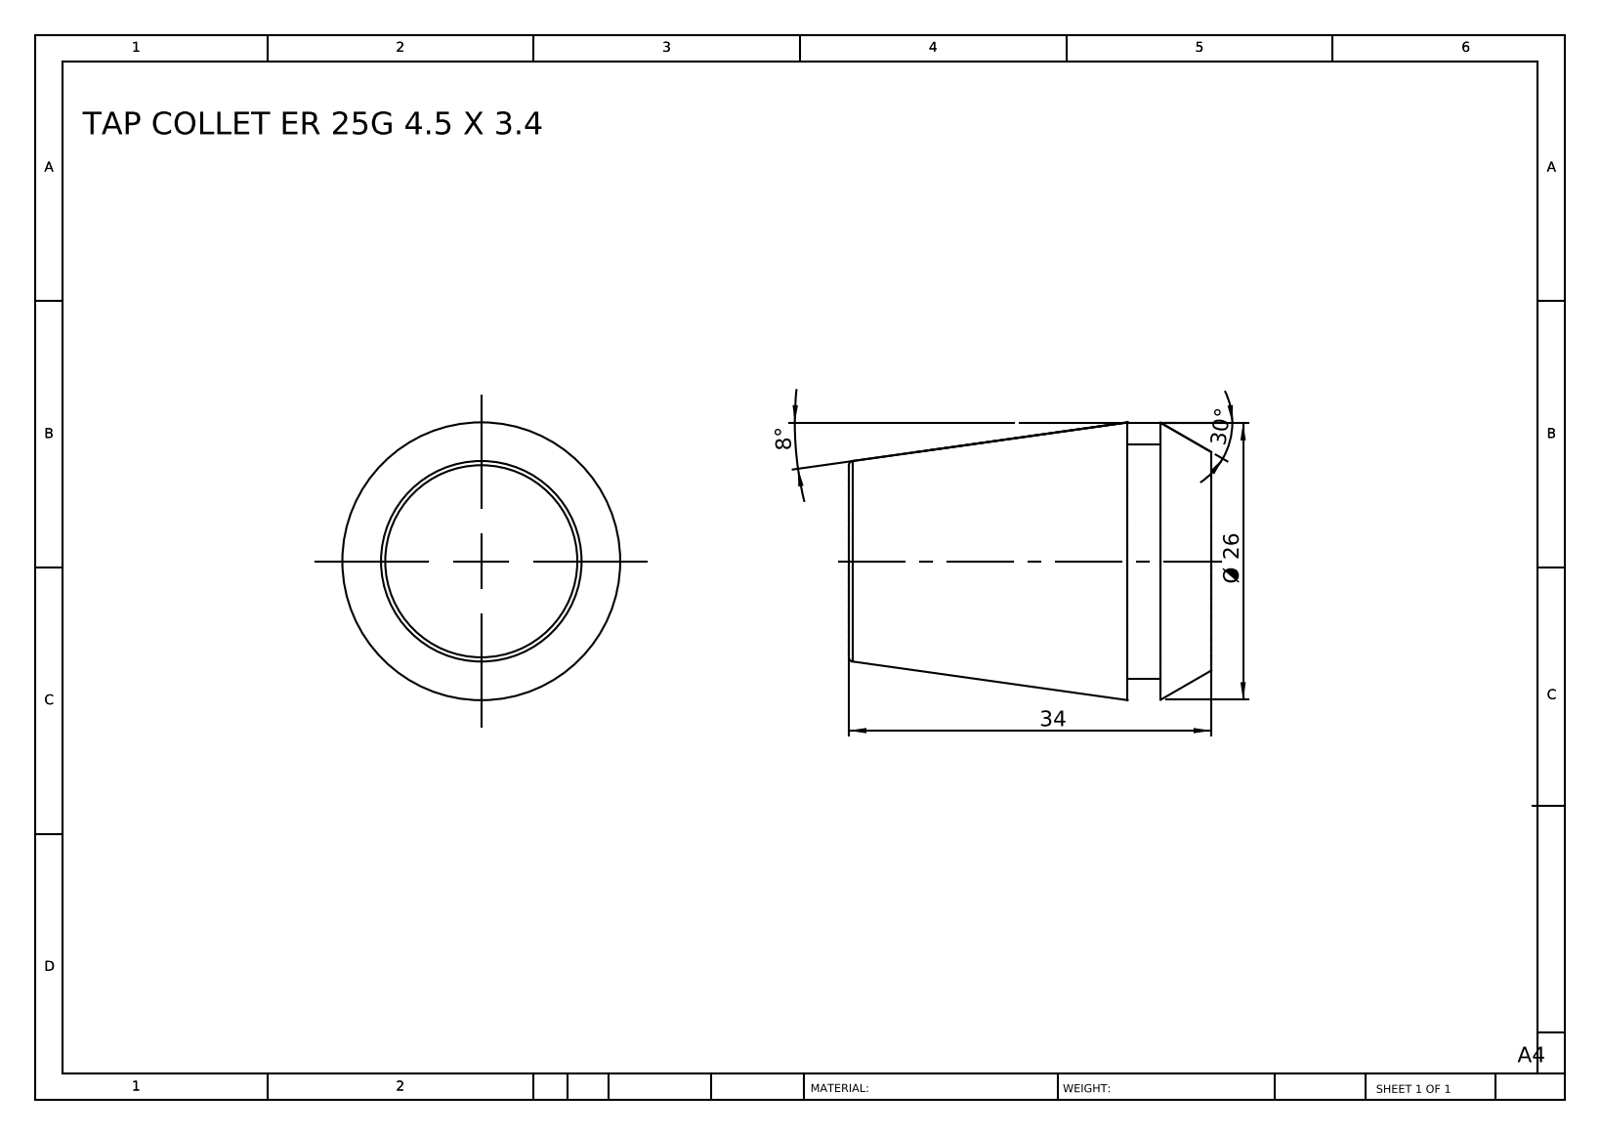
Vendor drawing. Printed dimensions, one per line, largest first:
34
30°
Ø 26
8°
